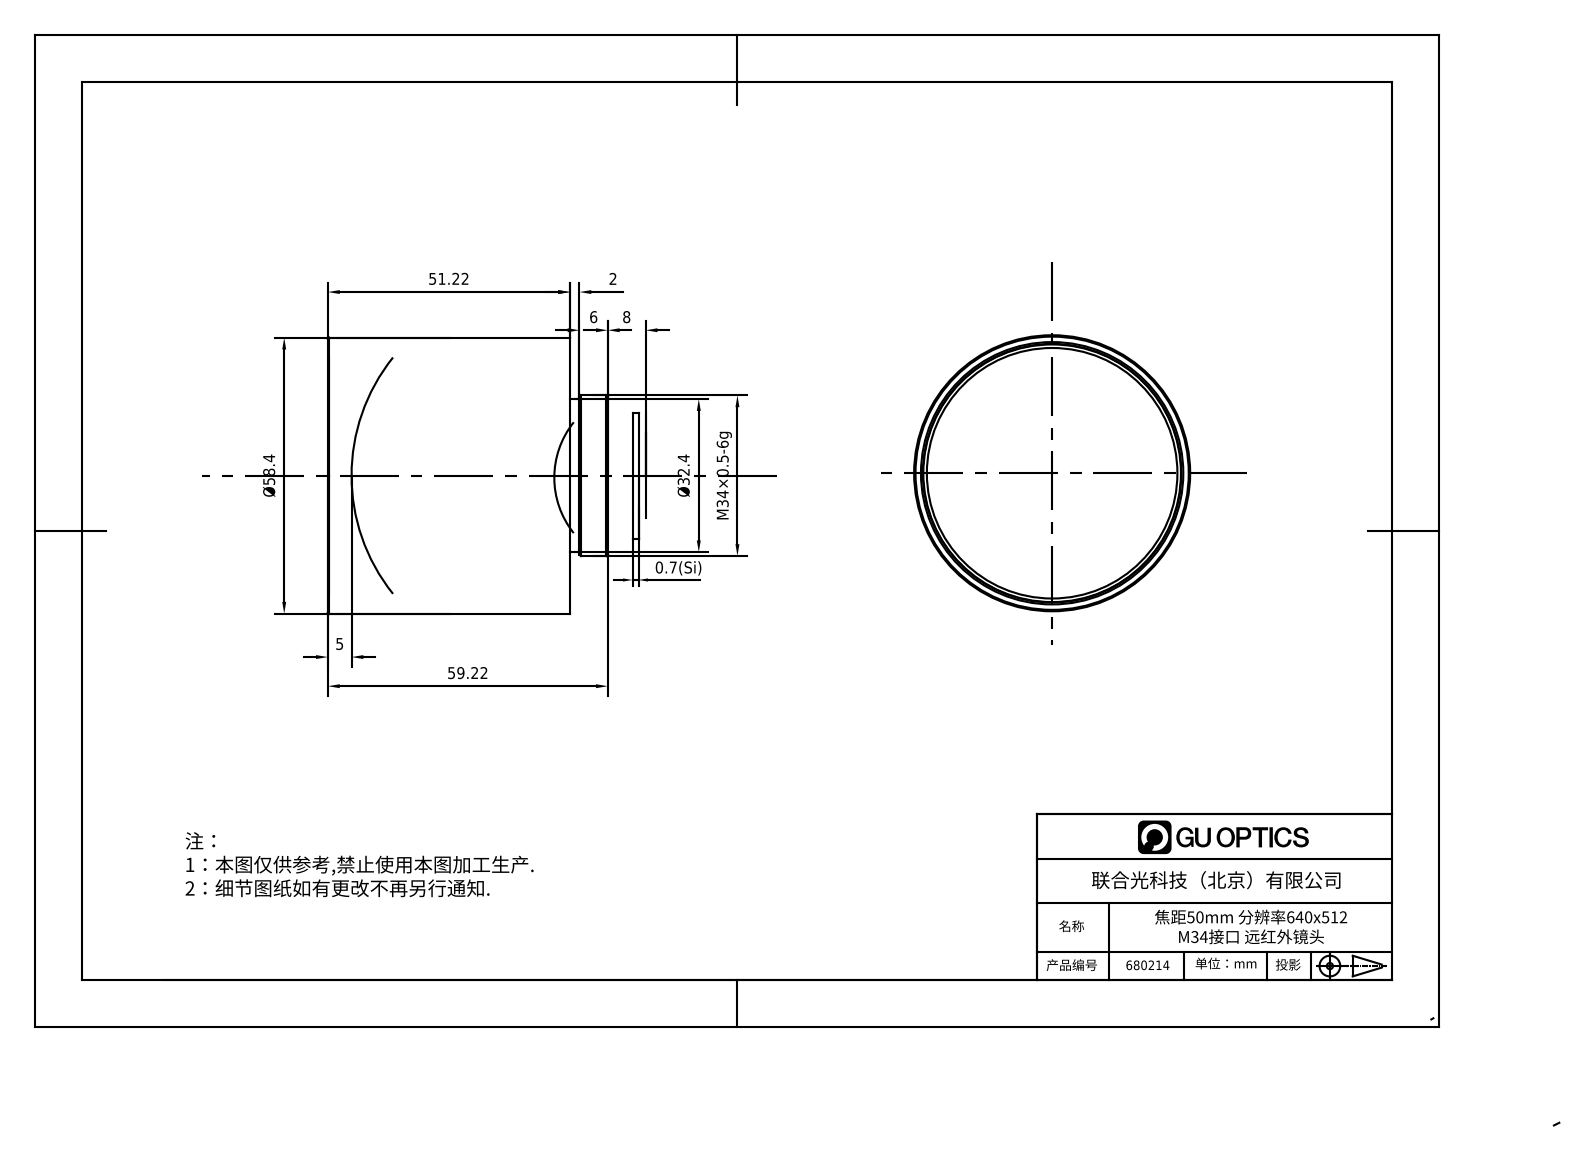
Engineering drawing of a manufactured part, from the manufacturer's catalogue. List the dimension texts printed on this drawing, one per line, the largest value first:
59.22
Ø58.4
51.22
M34×0.5-6g
Ø32.4
8
6
5
2
0.7(Si)
